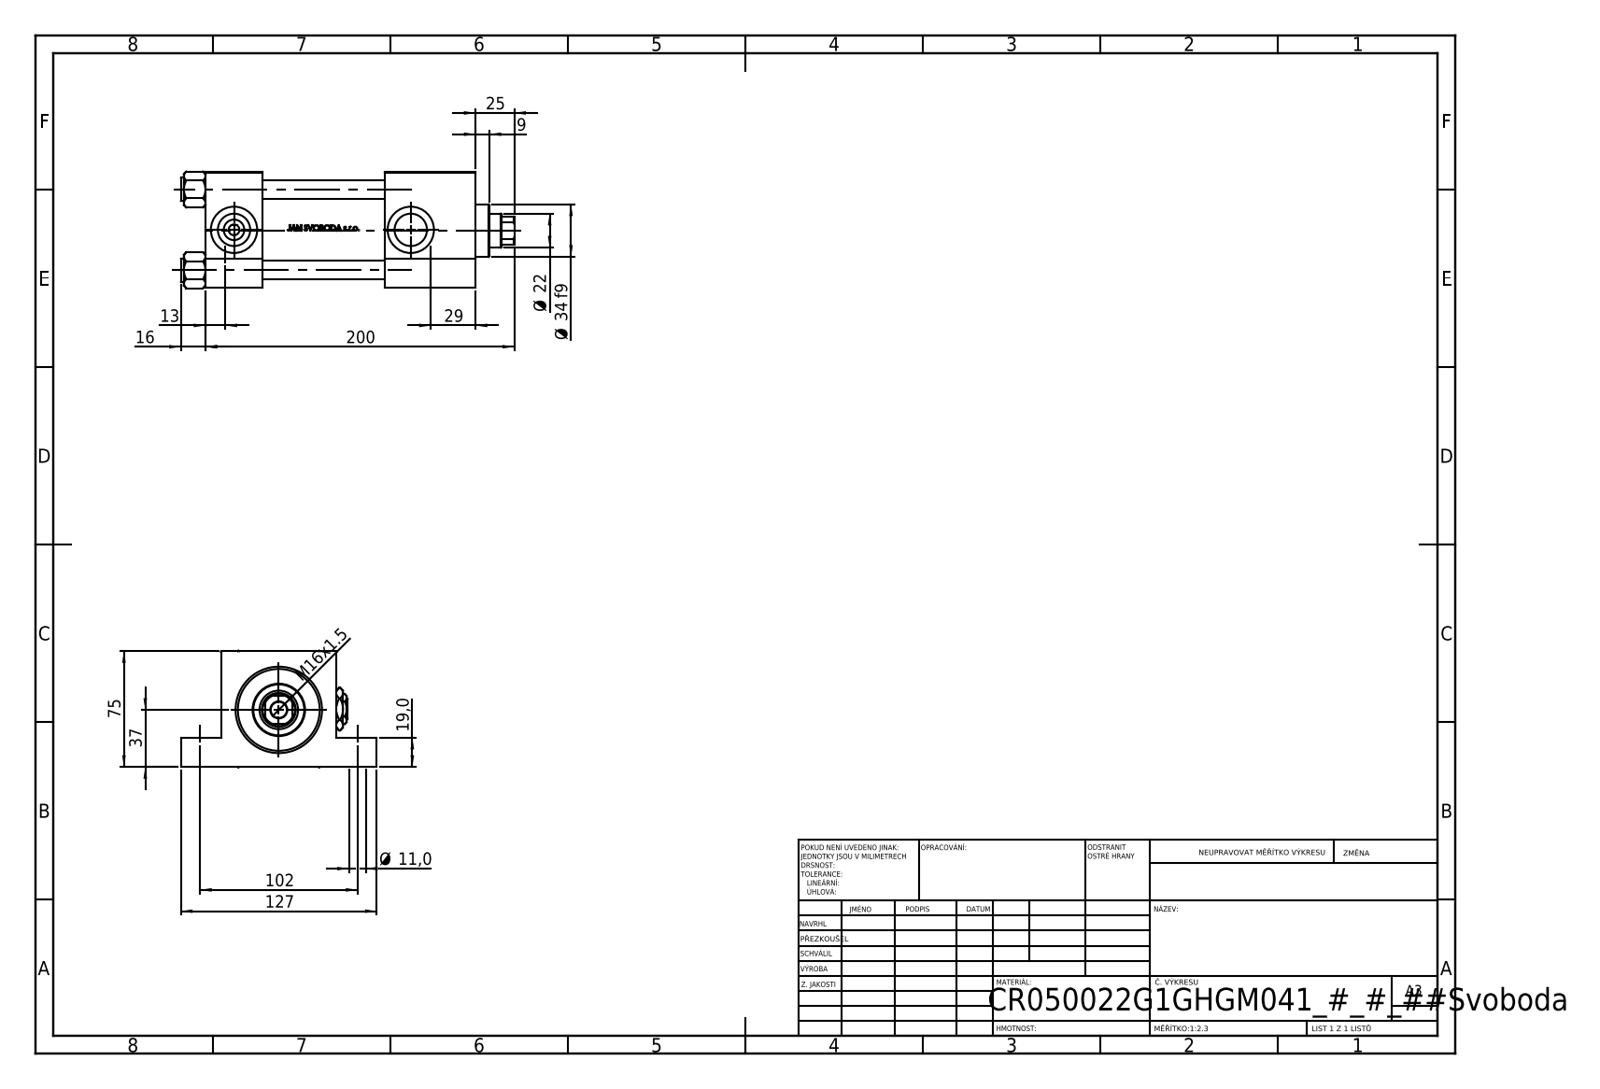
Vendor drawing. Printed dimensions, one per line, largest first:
200
127
102
75
37
Ø 34 f9
29
25
Ø 22
19,0
16
M16x1.5
13
Ø 11,0
9
